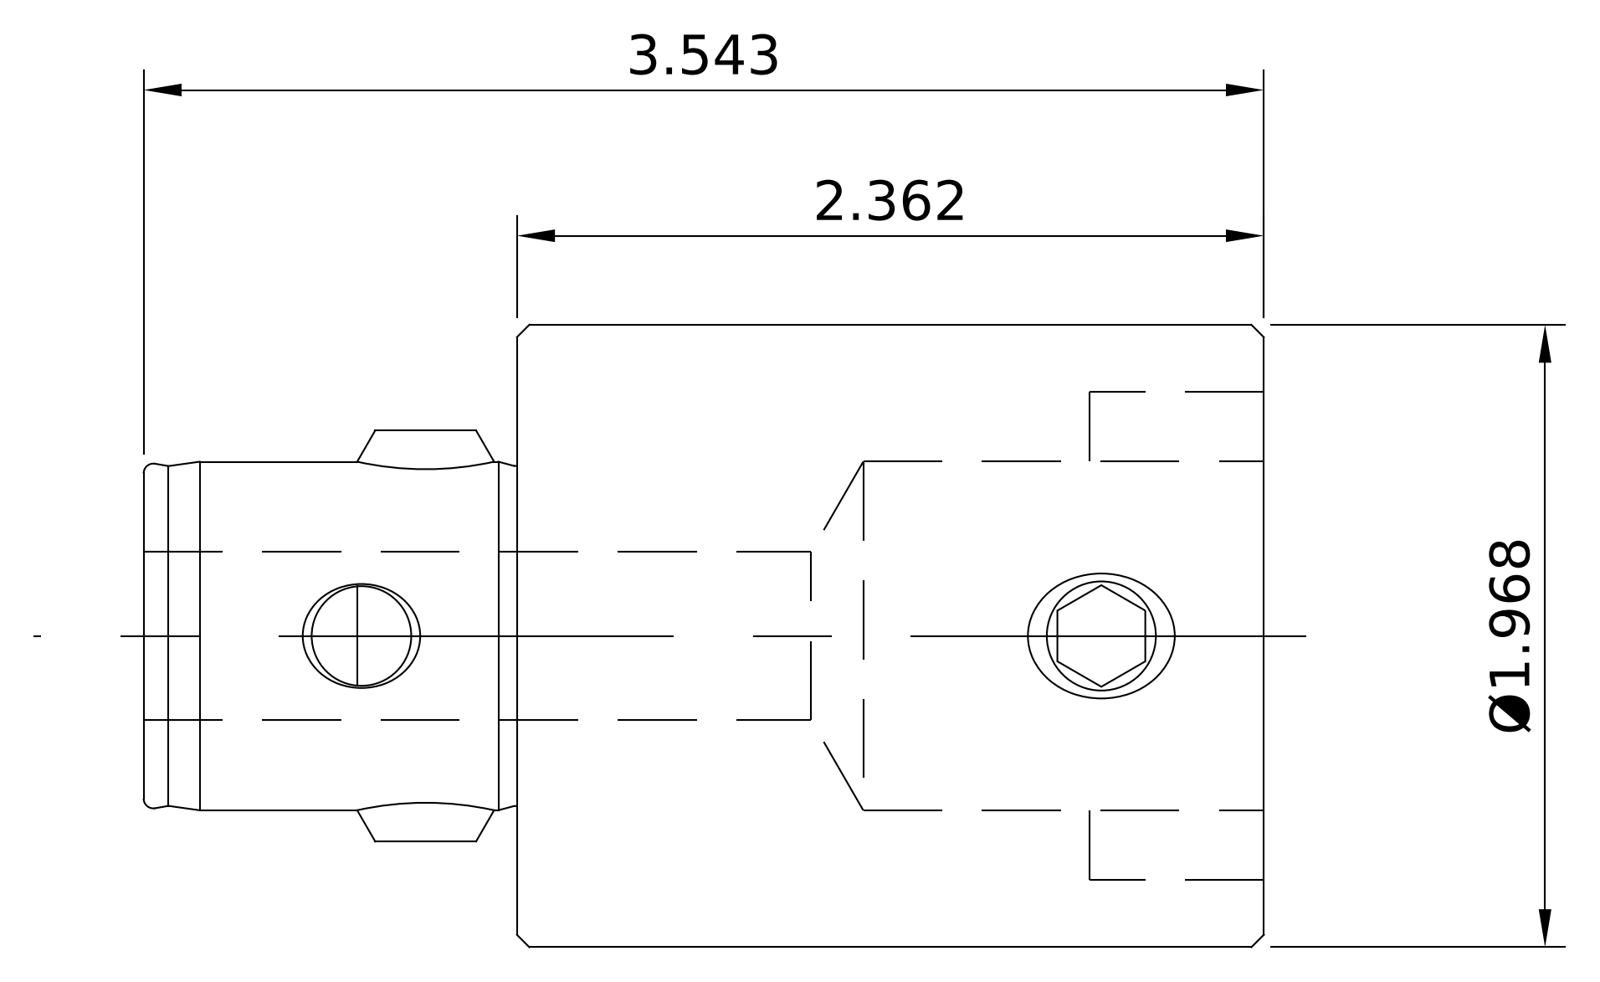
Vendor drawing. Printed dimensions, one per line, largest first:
3.543
2.362
Ø1.968
